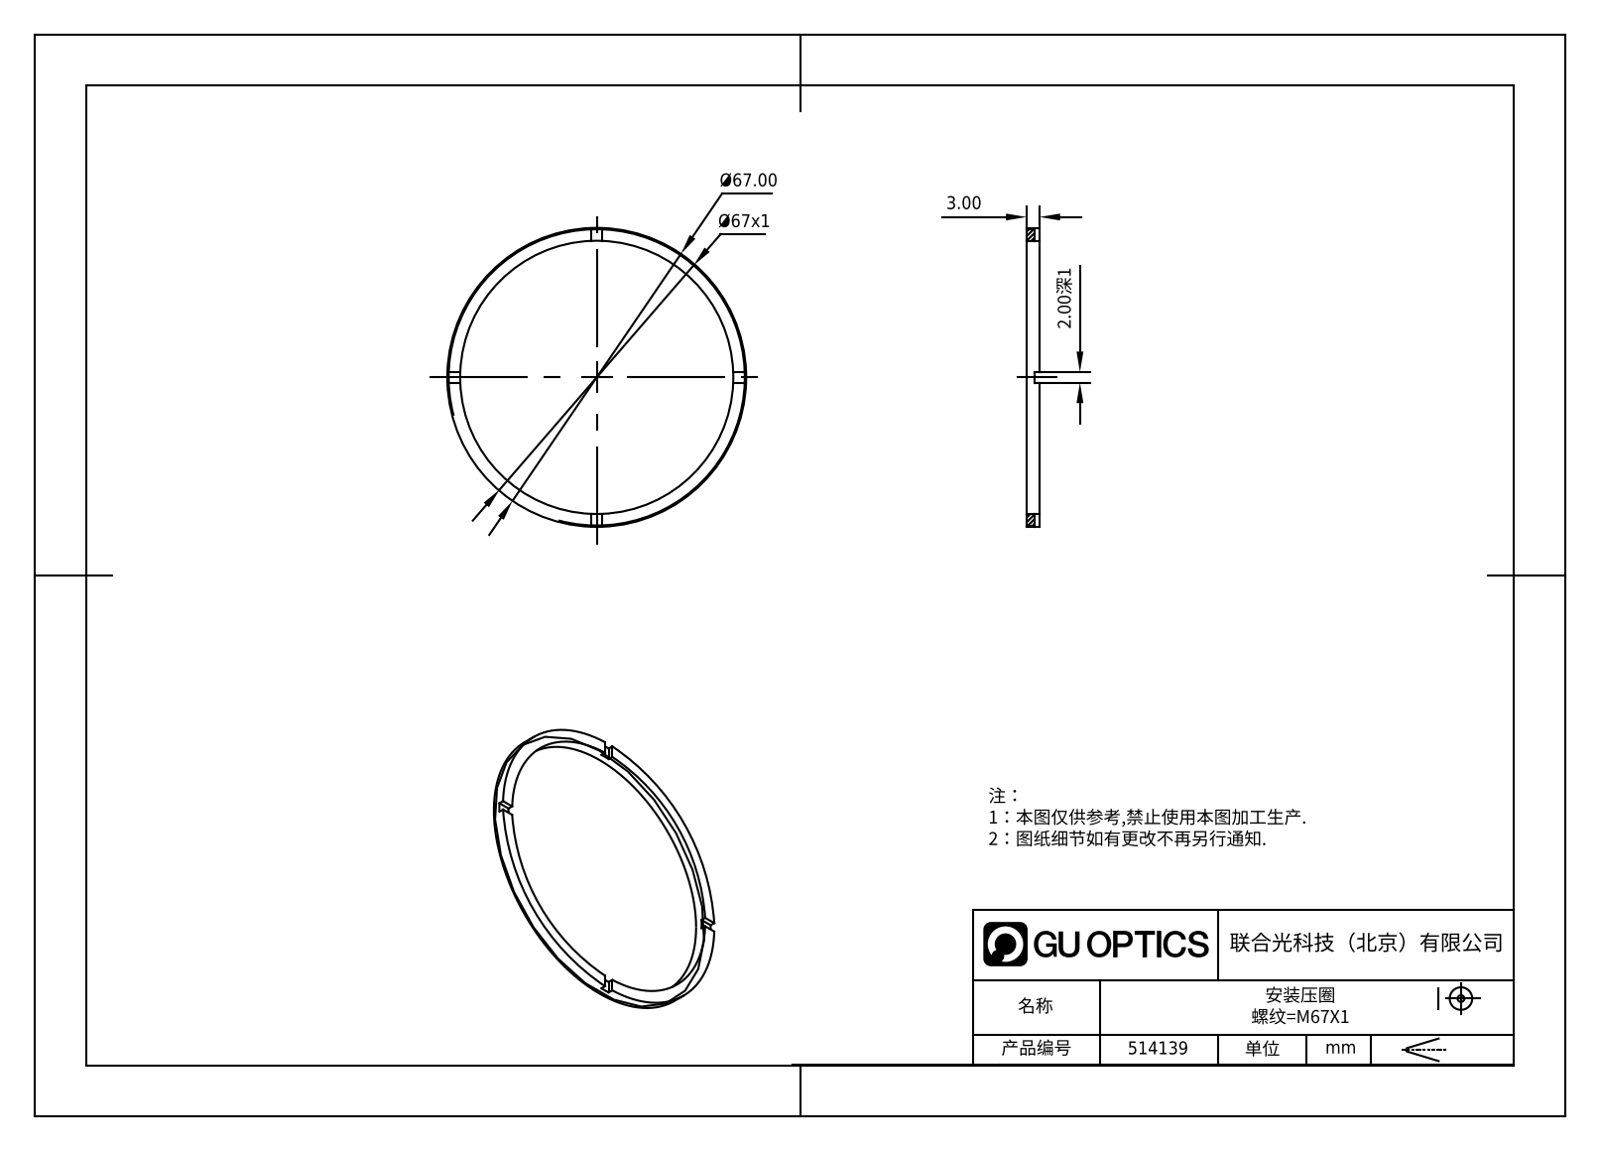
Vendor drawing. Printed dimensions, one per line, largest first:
Ø67.00
Ø67x1
3.00
2.00深1
